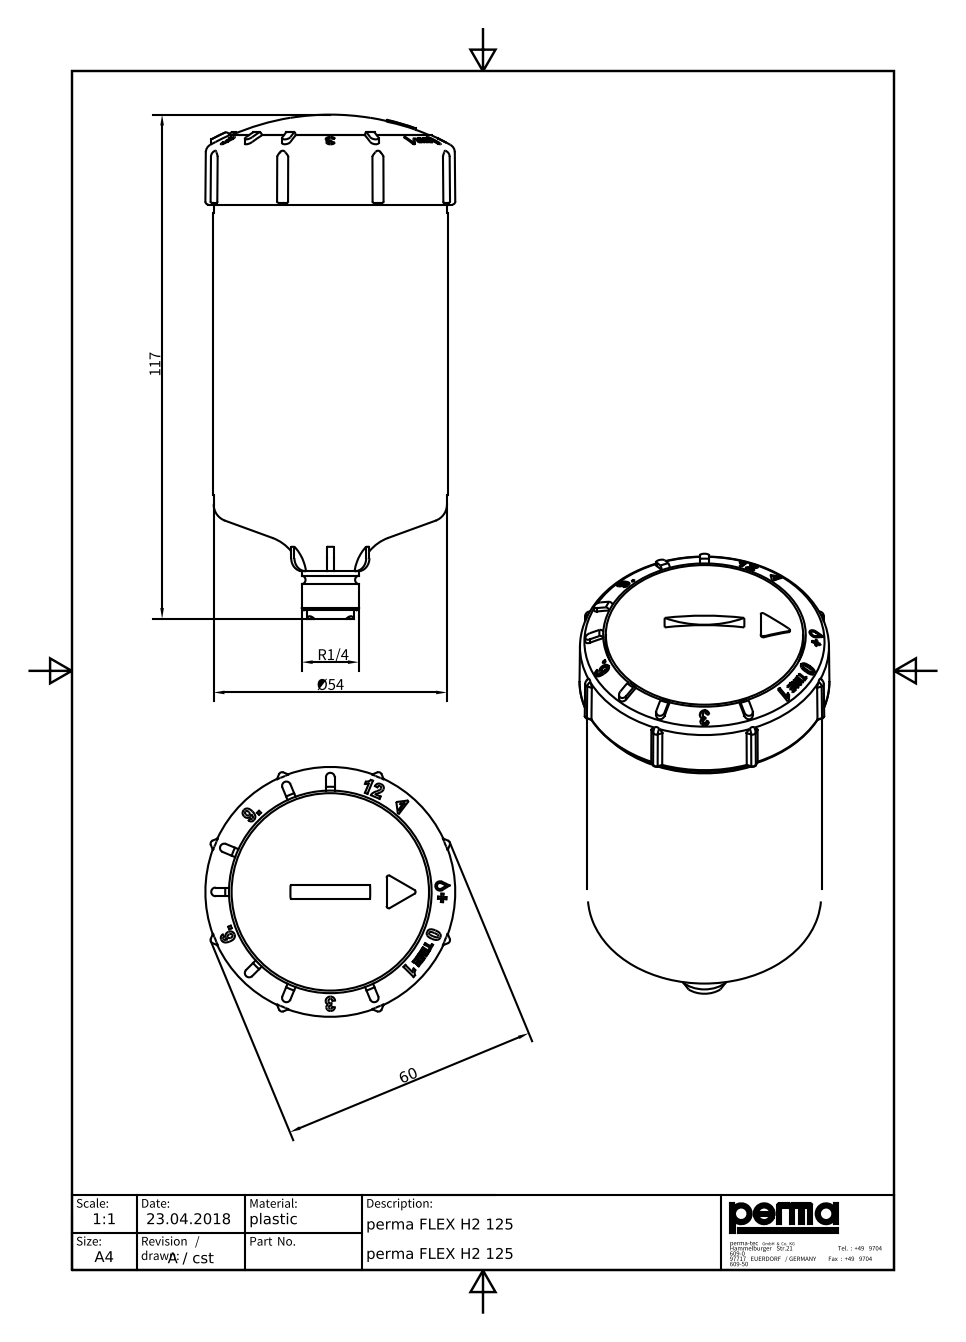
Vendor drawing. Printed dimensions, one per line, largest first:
117
60
Ø54
R1/4
